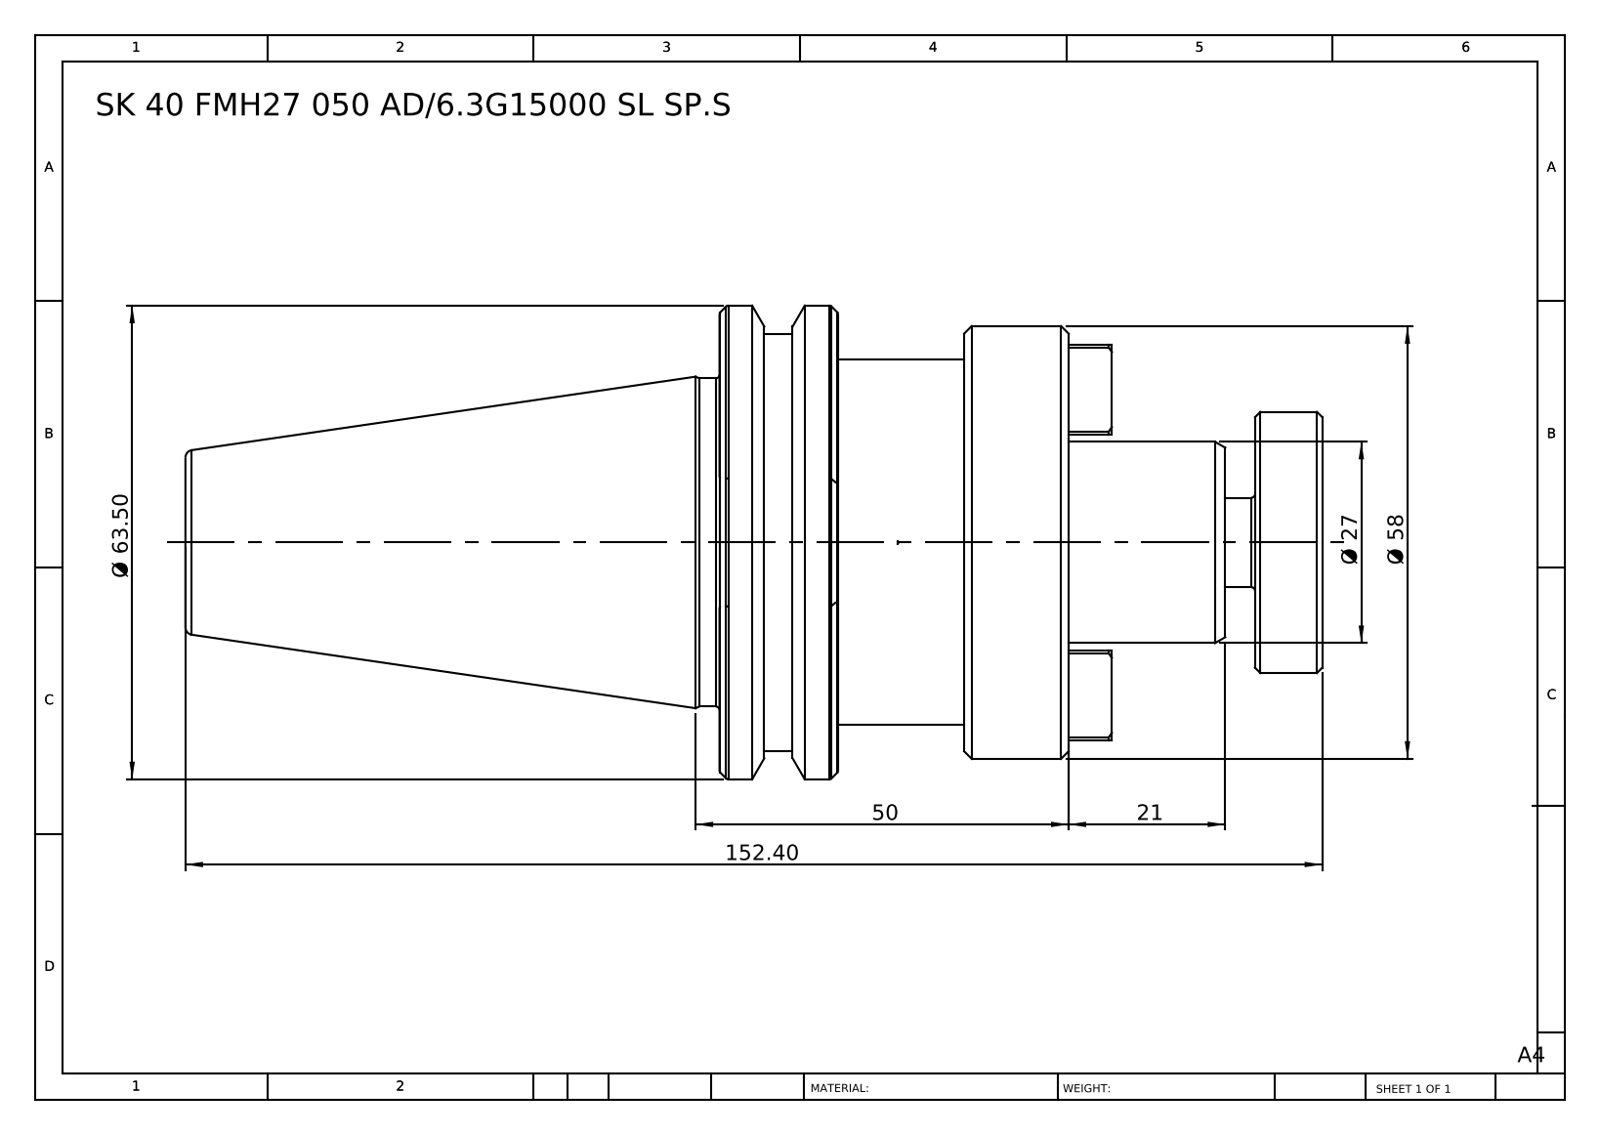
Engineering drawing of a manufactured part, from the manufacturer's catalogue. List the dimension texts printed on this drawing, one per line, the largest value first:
152.40
Ø 63.50
Ø 58
50
Ø 27
21
